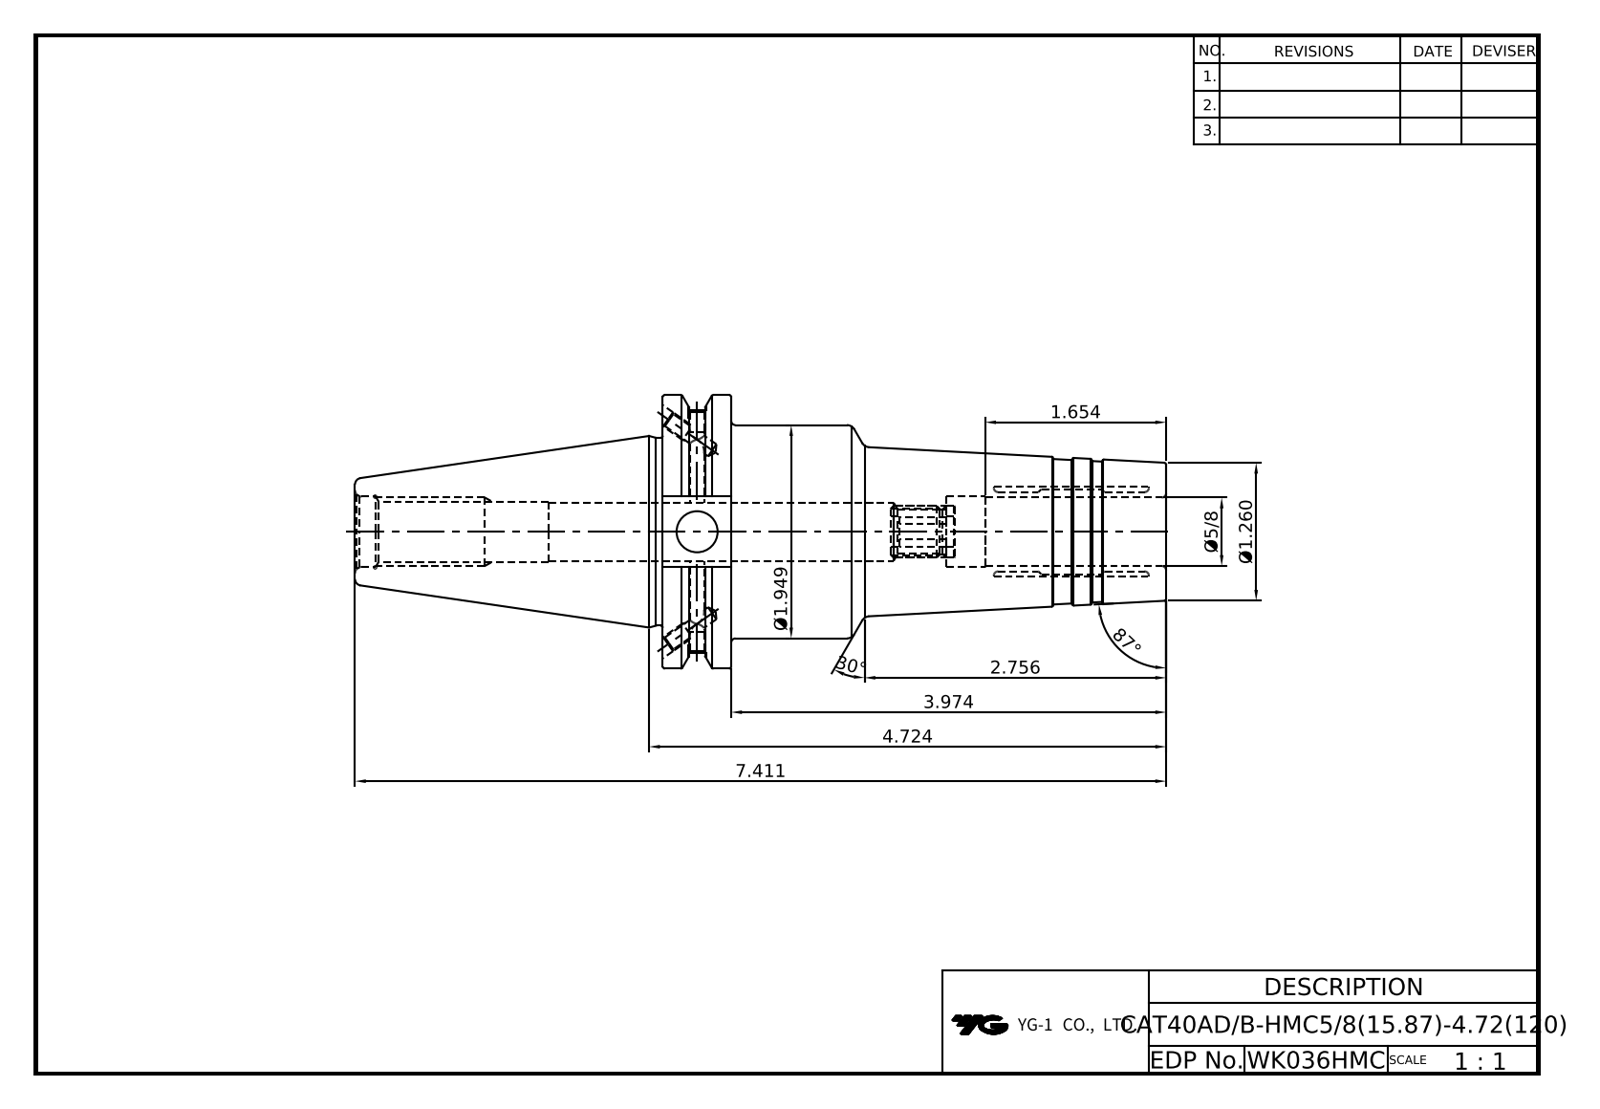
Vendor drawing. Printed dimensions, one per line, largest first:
87°
30°
7.411
4.724
3.974
2.756
Ø1.949
1.654
Ø1.260
Ø5/8
